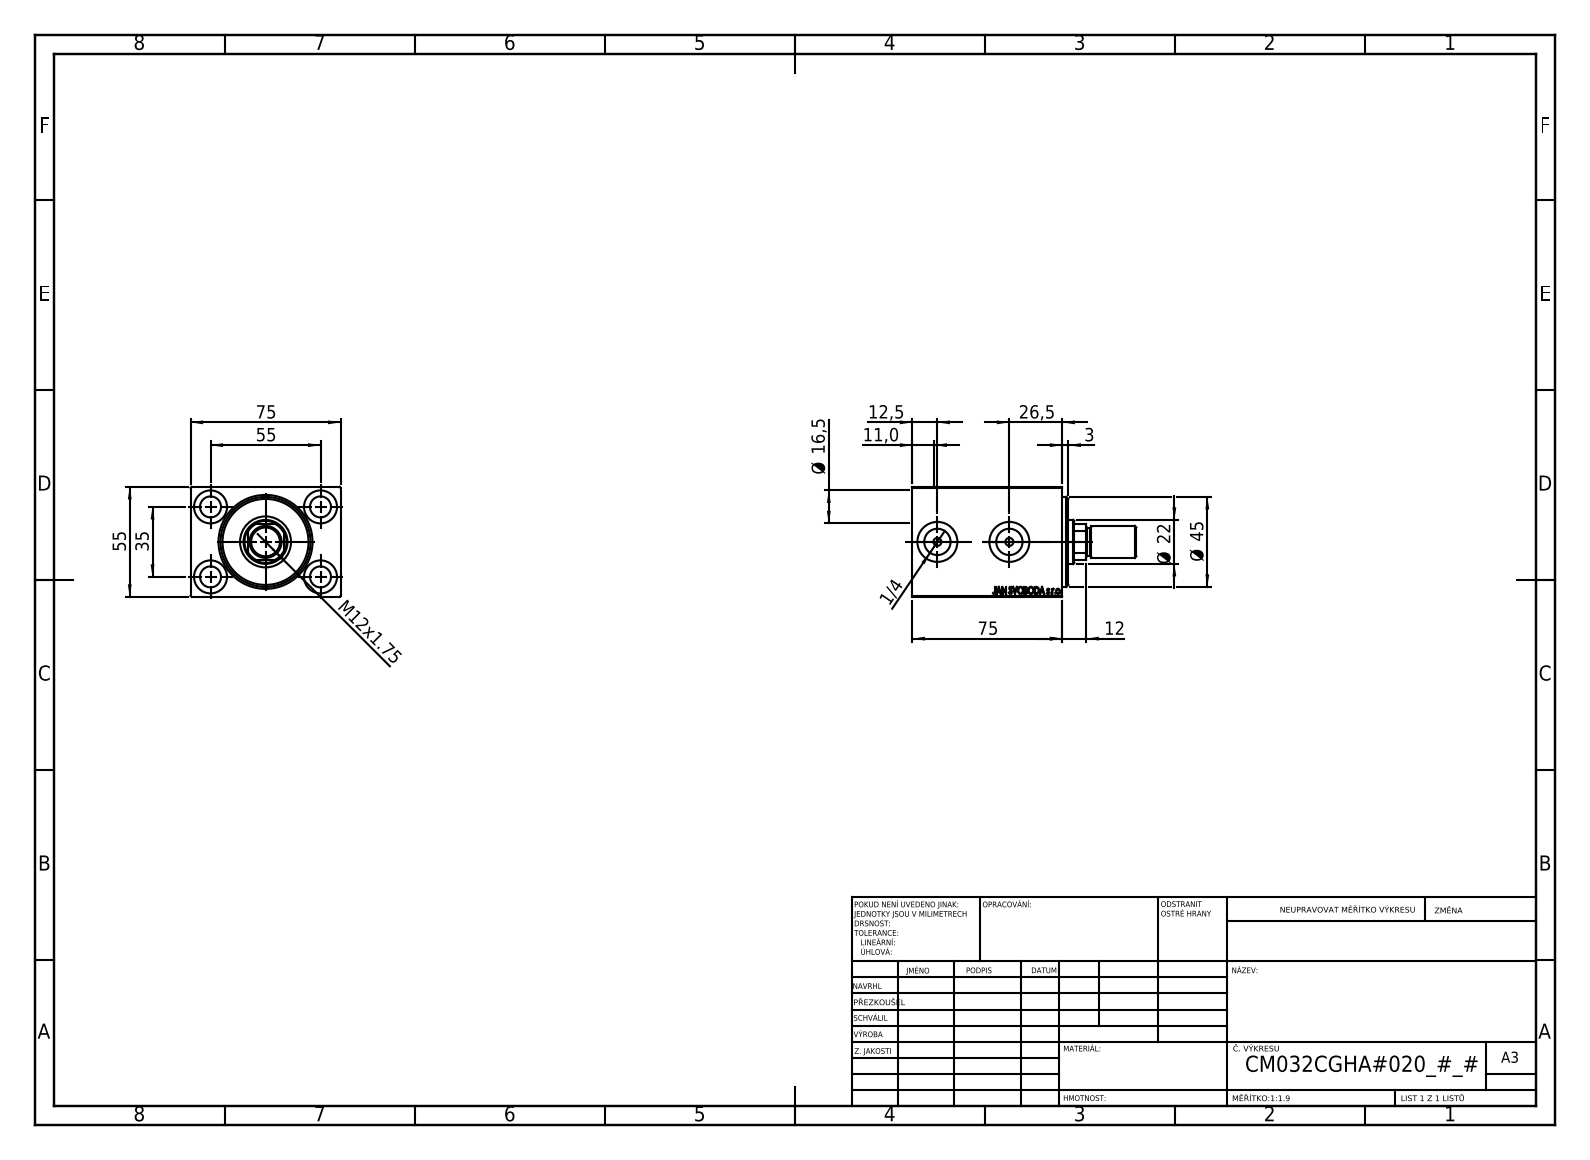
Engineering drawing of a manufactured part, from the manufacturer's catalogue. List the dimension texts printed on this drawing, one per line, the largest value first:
75
75
55
55
Ø 45
35
26,5
Ø 22
Ø 16,5
12,5
M12x1.75
12
11,0
3
1/4
